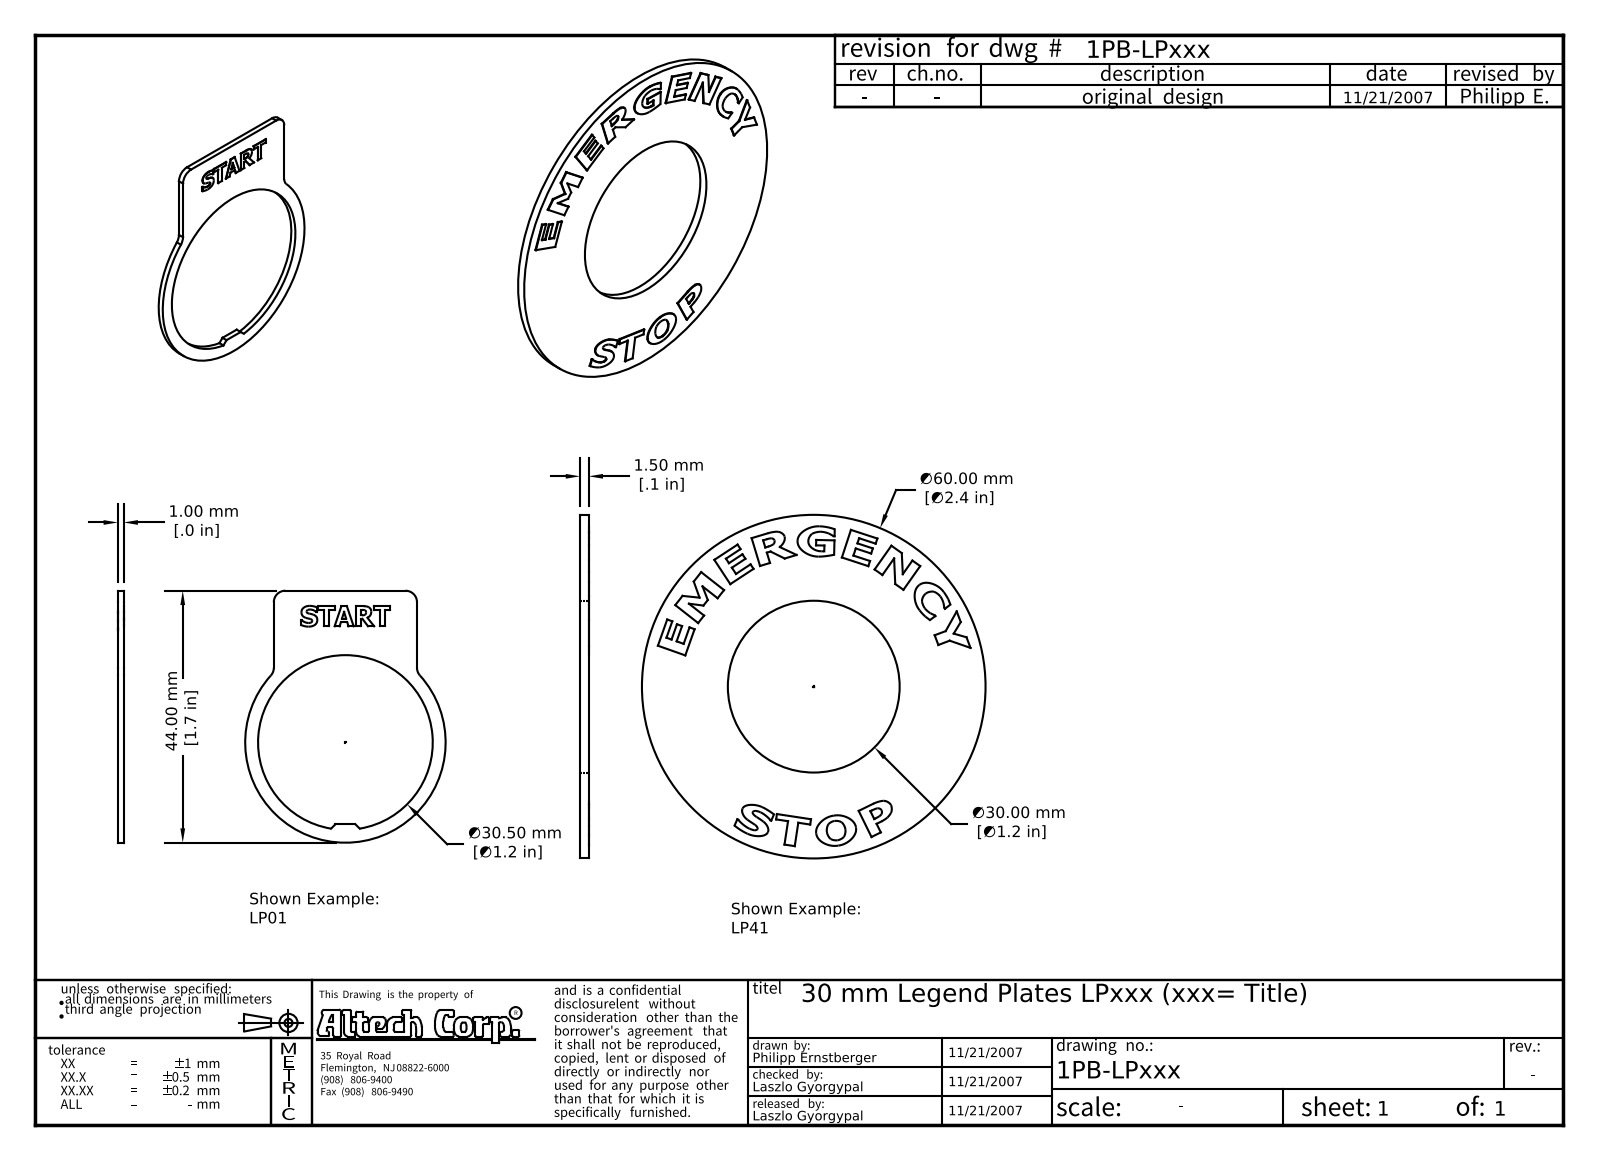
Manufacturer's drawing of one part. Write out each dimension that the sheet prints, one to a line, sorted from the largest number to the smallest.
∅60.00 mm [∅2.4 in]
44.00 mm [1.7 in]
∅30.50 mm [∅1.2 in]
∅30.00 mm [∅1.2 in]
1.50 mm [.1 in]
1.00 mm [.0 in]
